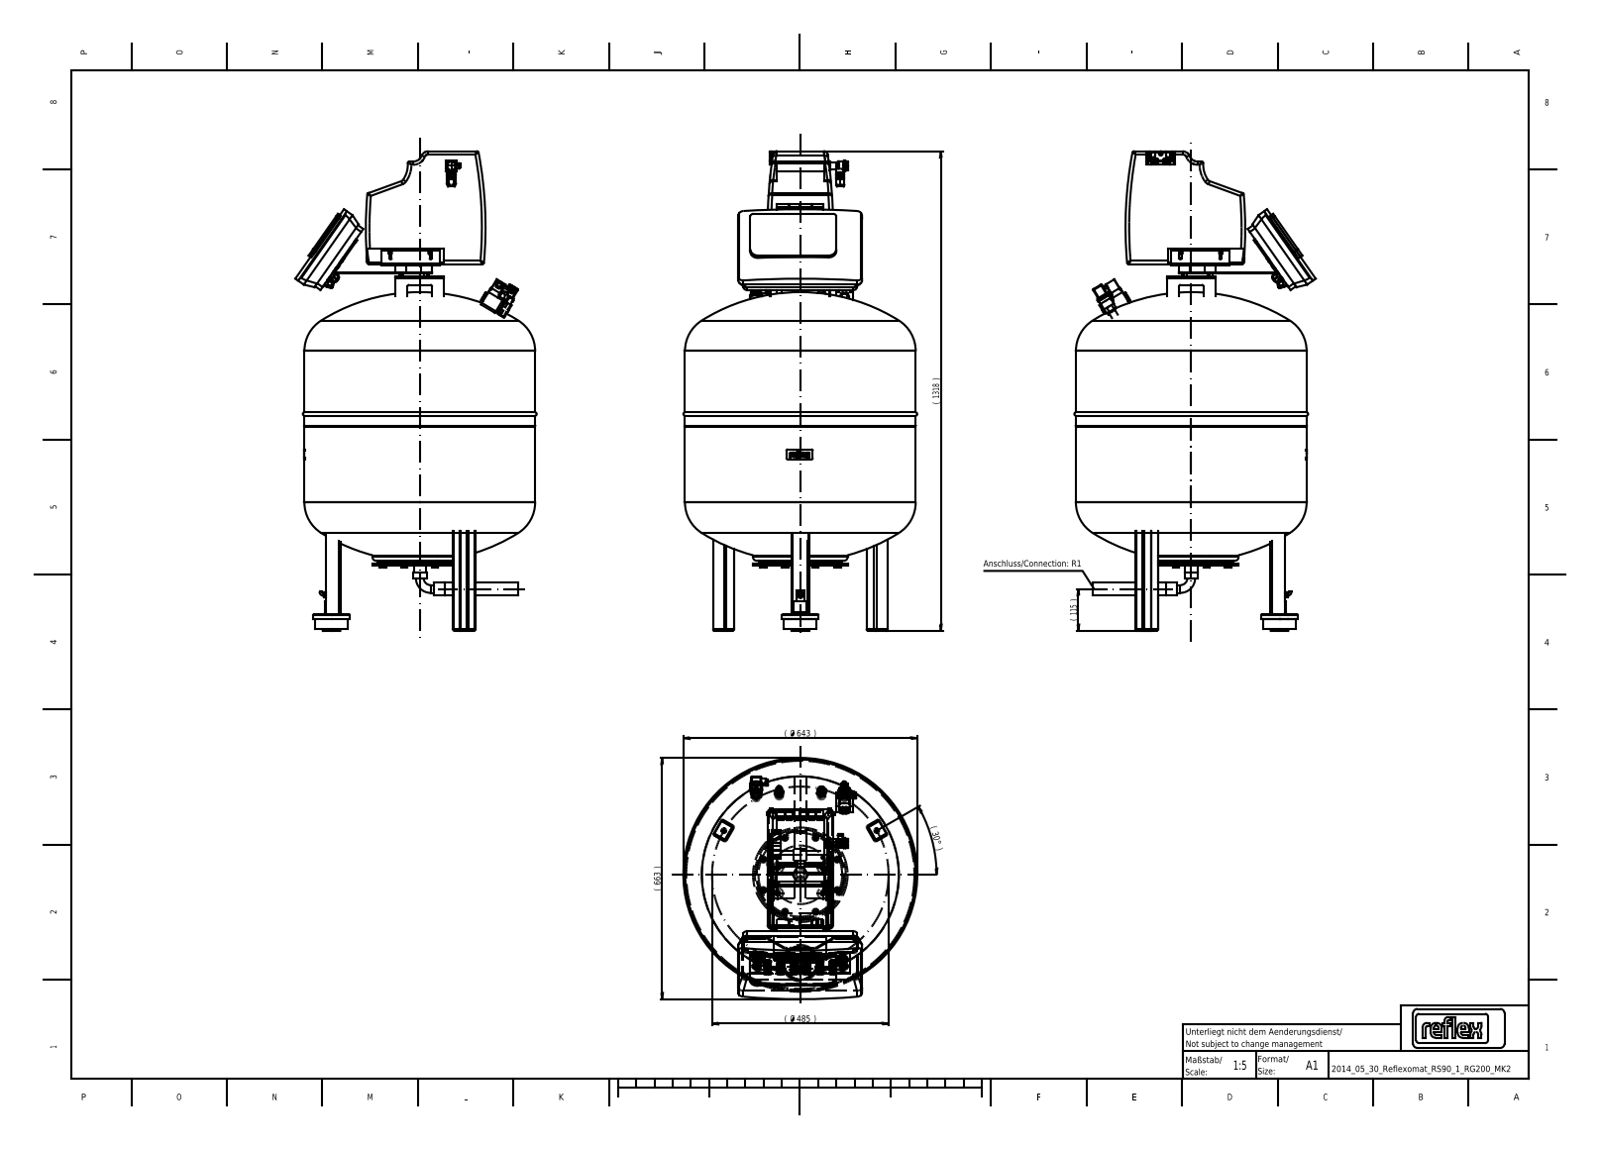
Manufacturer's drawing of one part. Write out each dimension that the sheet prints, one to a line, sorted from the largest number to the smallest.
1318 ( )
663 ( )
643 Ø ( )
485 Ø ( )
115 ( )
30 ° ( )
